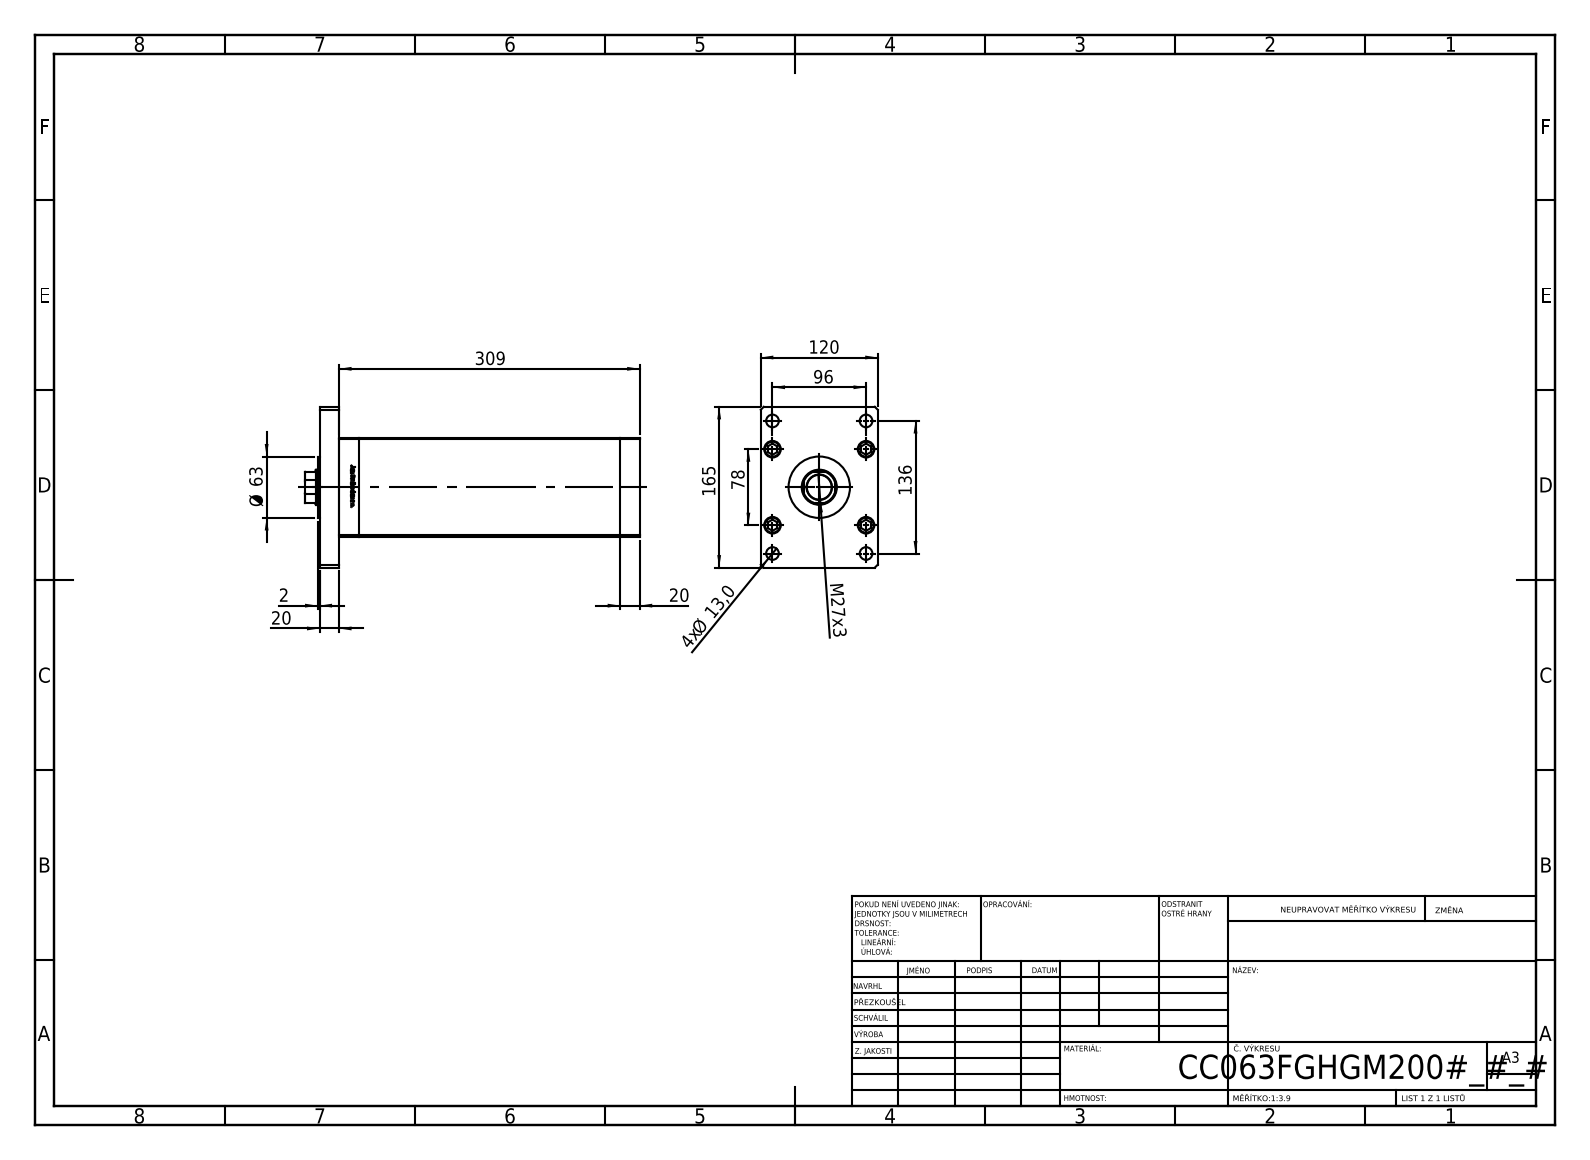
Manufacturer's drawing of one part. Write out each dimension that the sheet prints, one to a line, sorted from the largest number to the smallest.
309
165
136
120
96
78
Ø 63
M27x3
20
20
4x Ø 13,0
2
